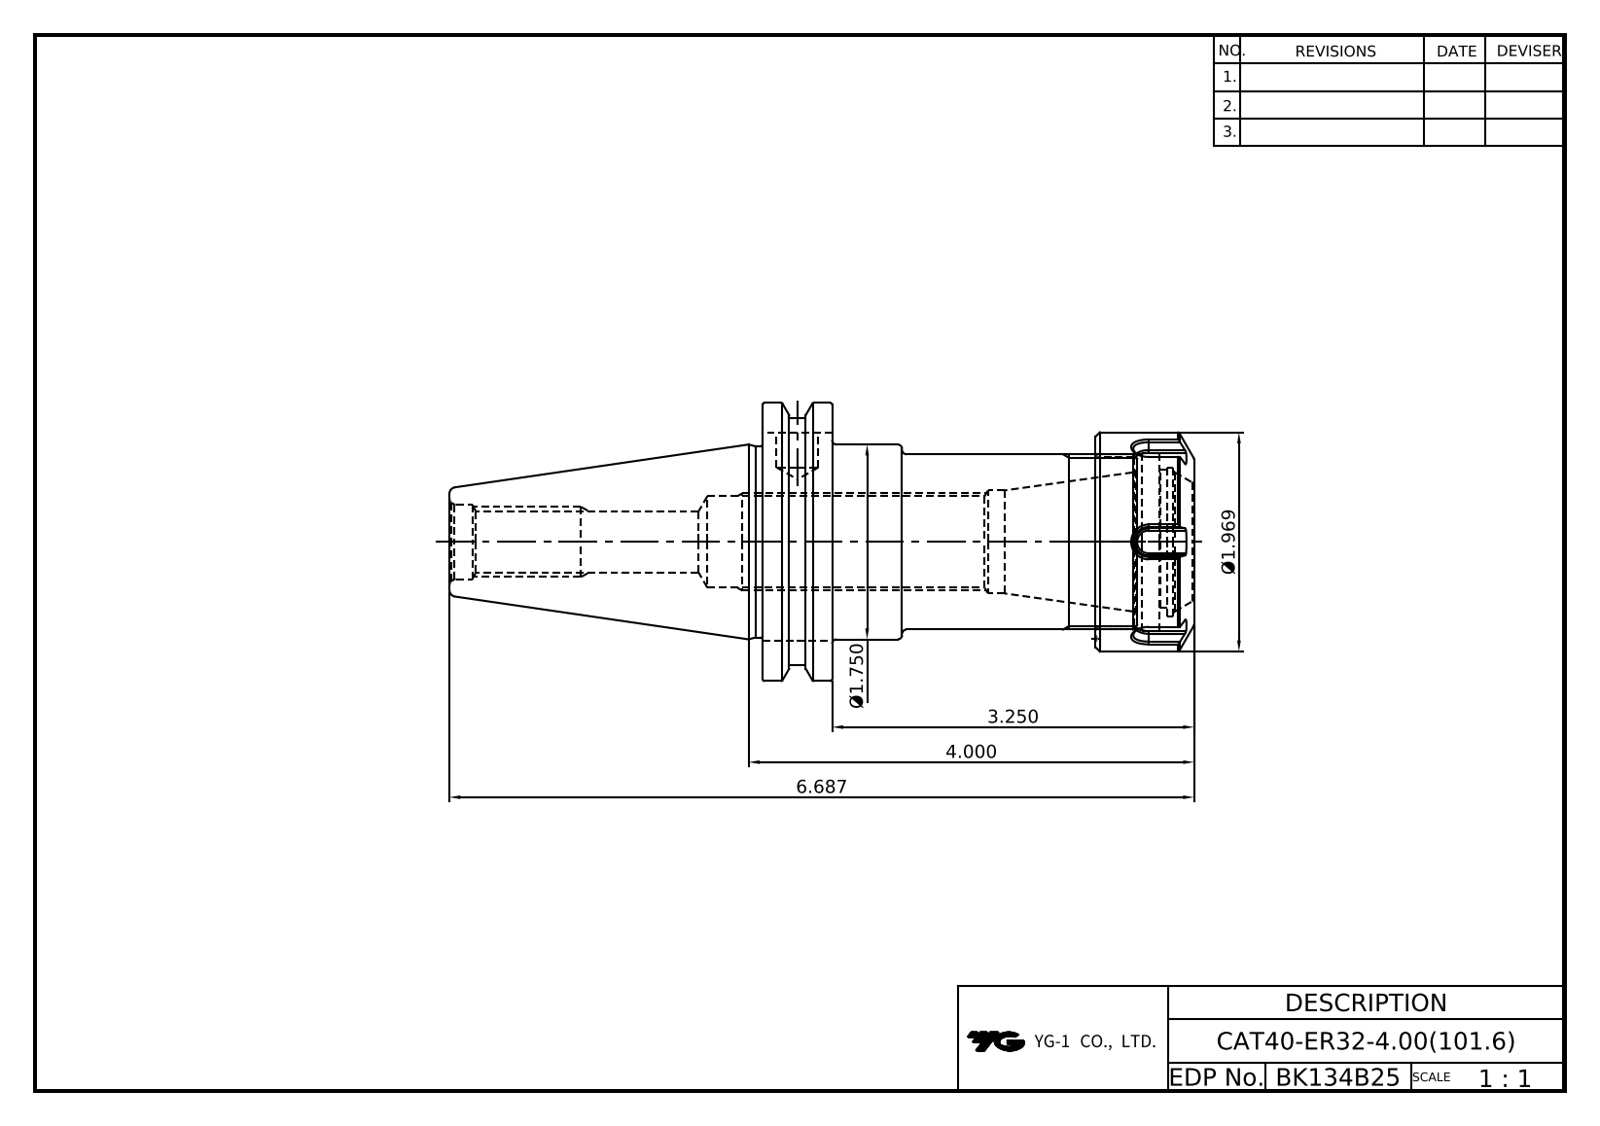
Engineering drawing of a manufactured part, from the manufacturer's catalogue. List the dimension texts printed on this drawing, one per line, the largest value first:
6.687
4.000
3.250
Ø1.969
Ø1.750
